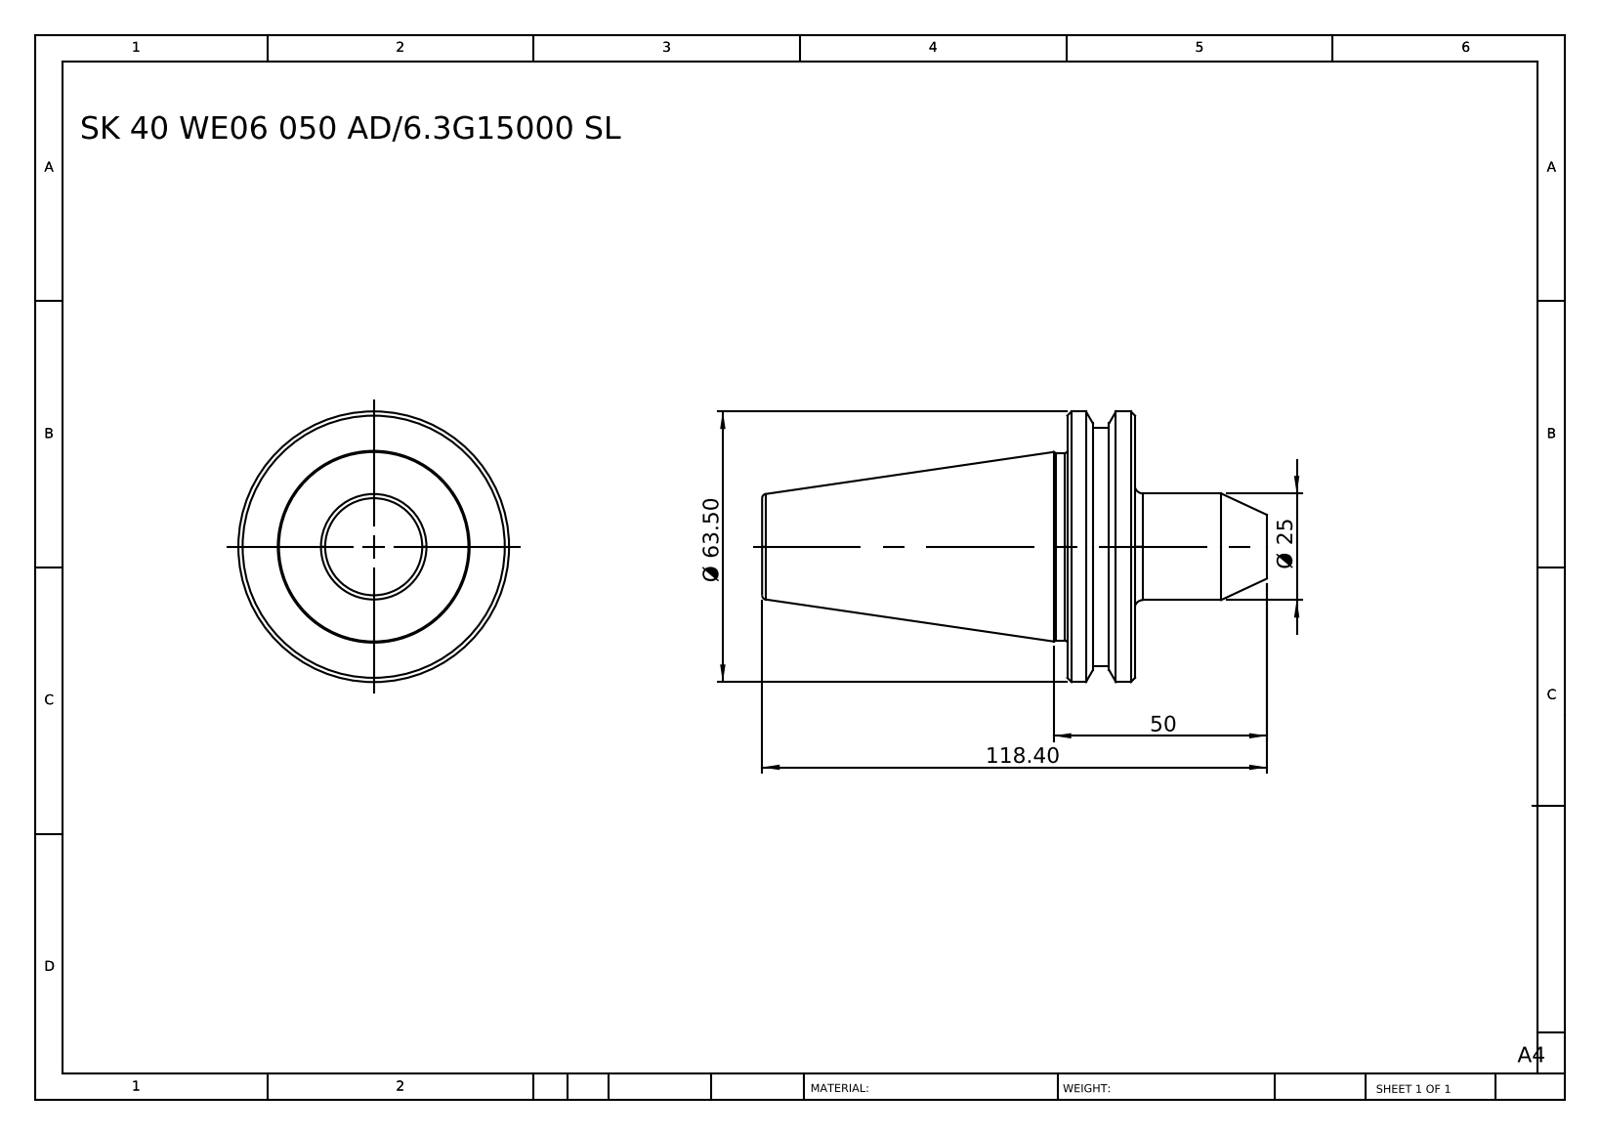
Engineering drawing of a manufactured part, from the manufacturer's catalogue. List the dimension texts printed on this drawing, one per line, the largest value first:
118.40
Ø 63.50
50
Ø 25
